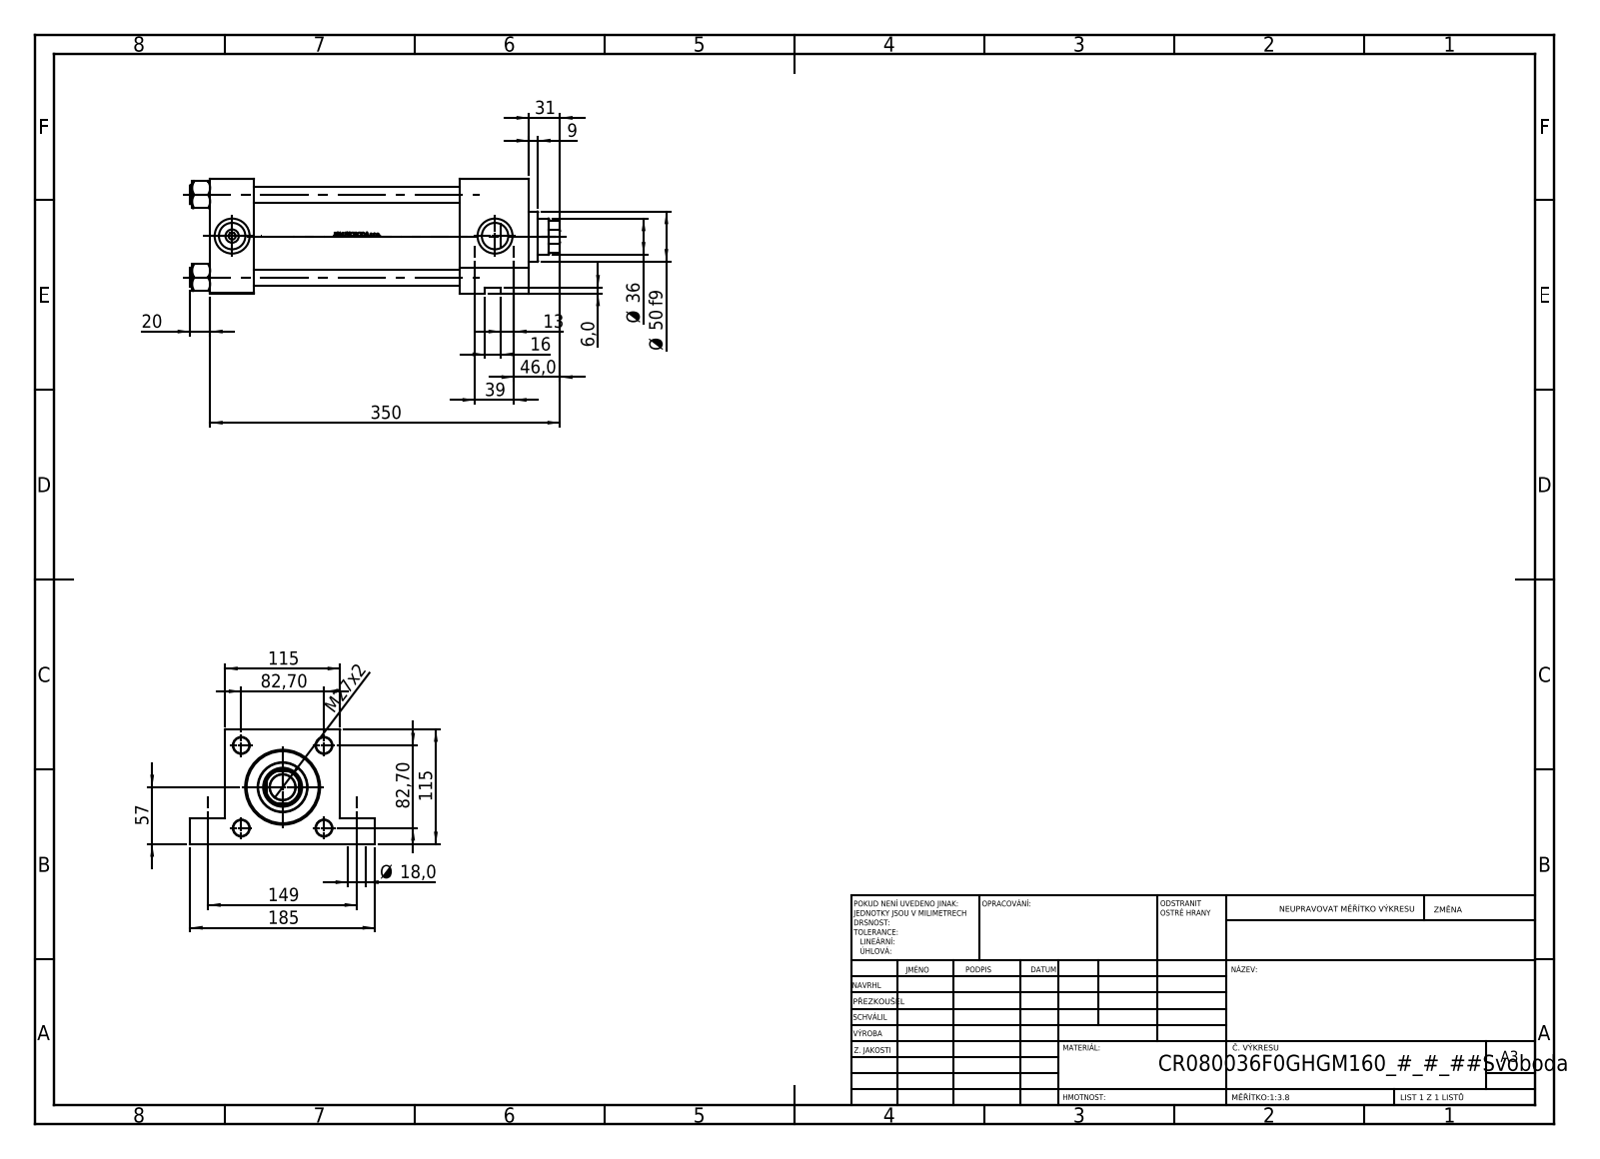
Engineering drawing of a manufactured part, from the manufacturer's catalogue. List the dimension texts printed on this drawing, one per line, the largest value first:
350
185
149
115
115
82,70
82,70
57
Ø 50 f9
46,0
39
Ø 36
31
M27x2
20
Ø 18,0
16
13
9
6,0
